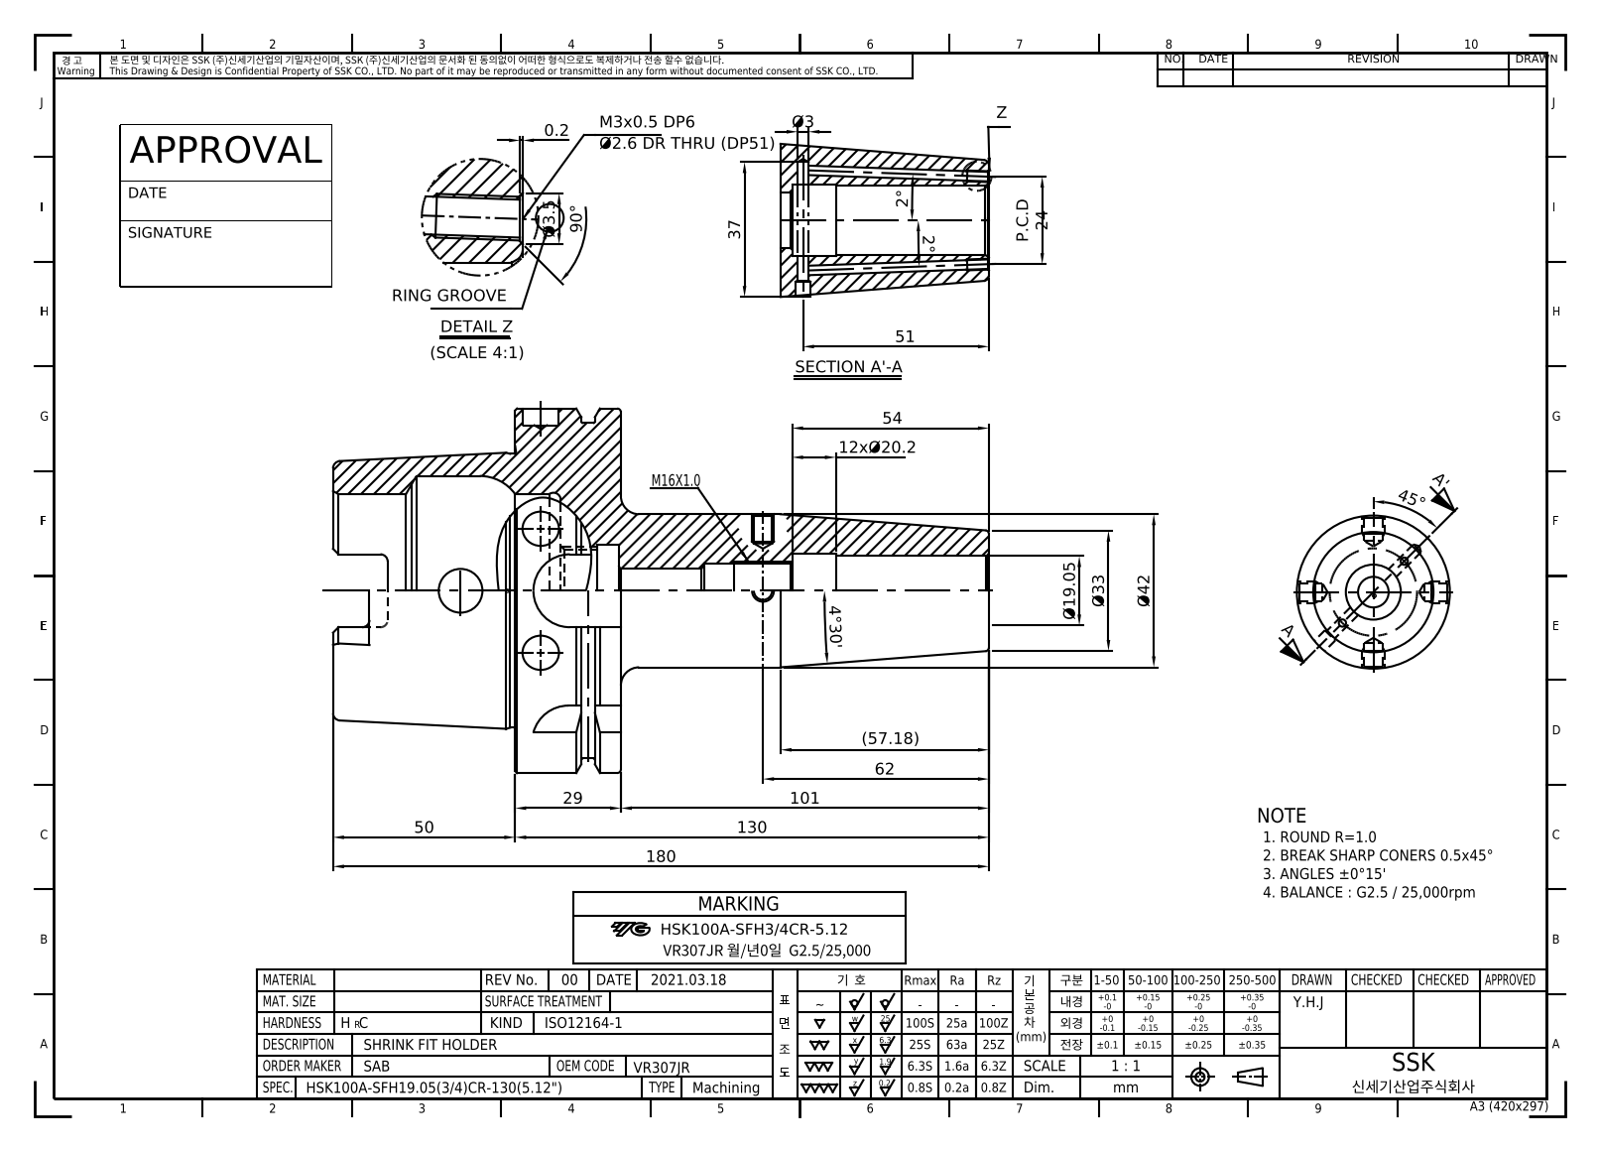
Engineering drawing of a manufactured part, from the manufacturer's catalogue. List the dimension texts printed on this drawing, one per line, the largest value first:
180
130
101
90°
62
(57.18)
54
51
50
45°
Ø42
37
Ø33
29
P.C.D 24
12xØ20.2
Ø19.05
4°30'
Ø3.5
Ø3
2°
2°
0.2
